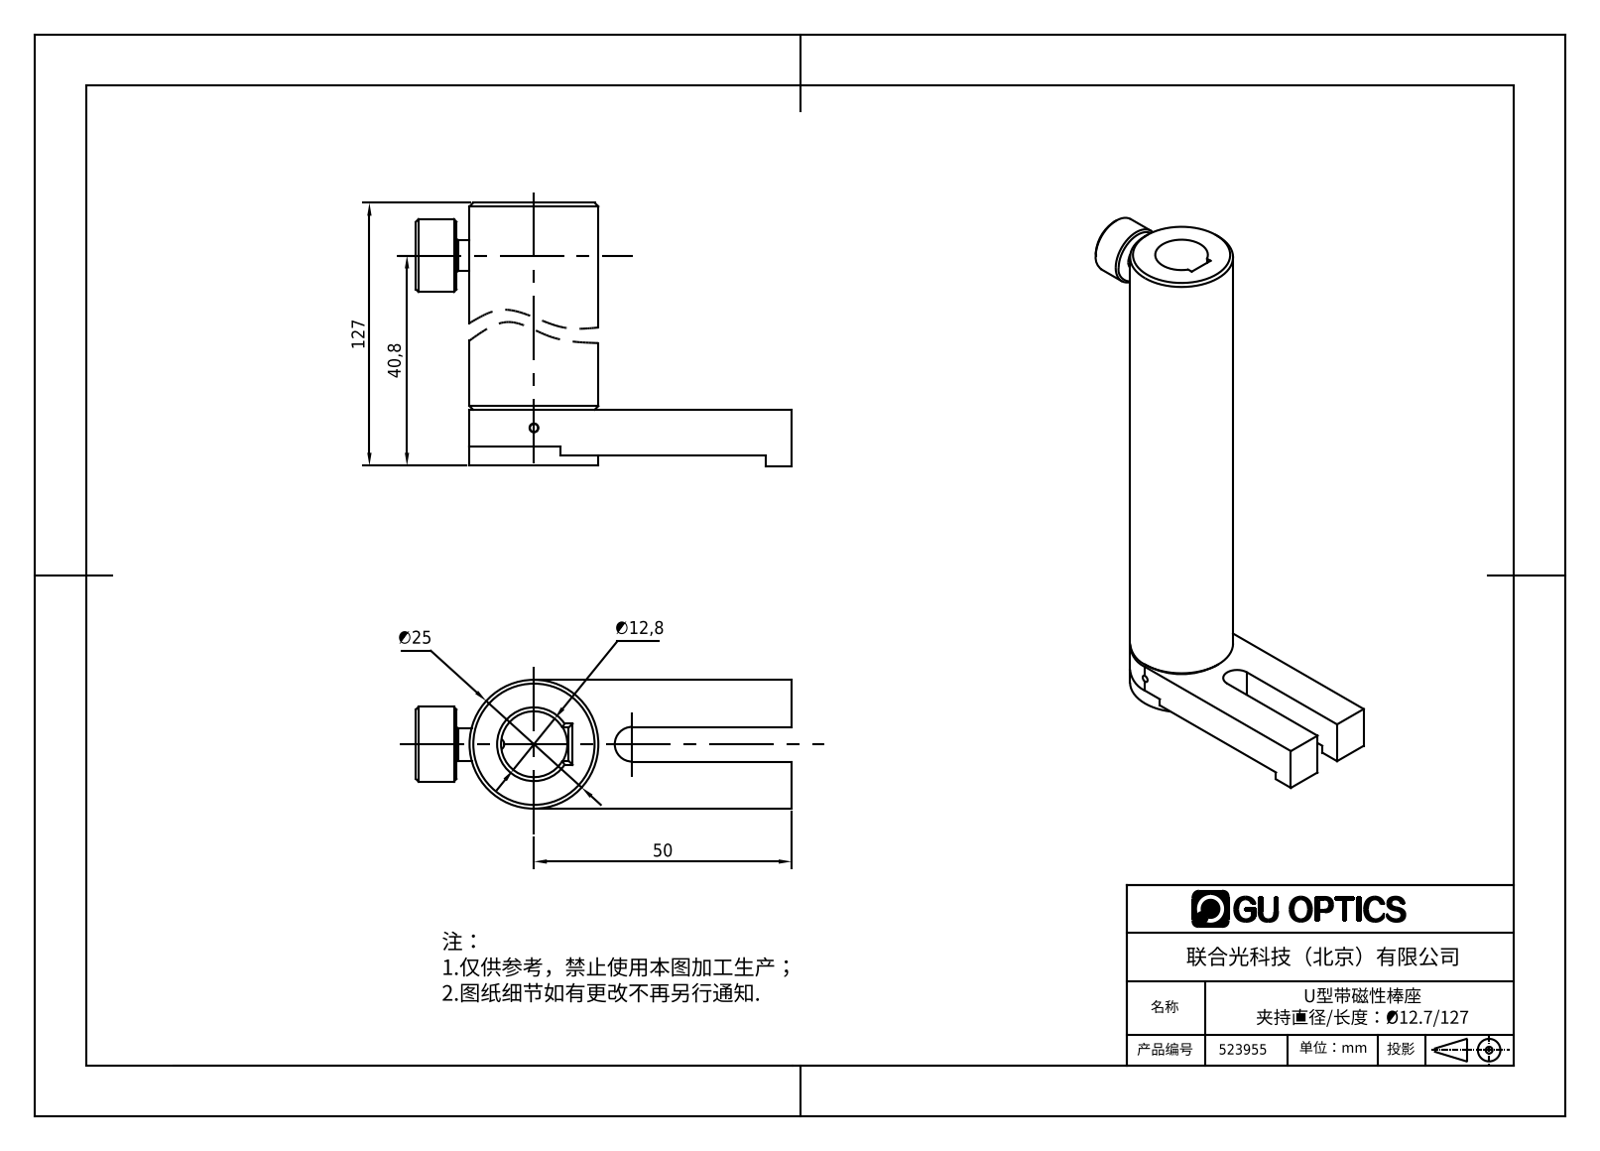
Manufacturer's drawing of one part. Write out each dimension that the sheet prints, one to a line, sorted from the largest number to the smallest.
127
50
40,8
∅25
∅12,8
